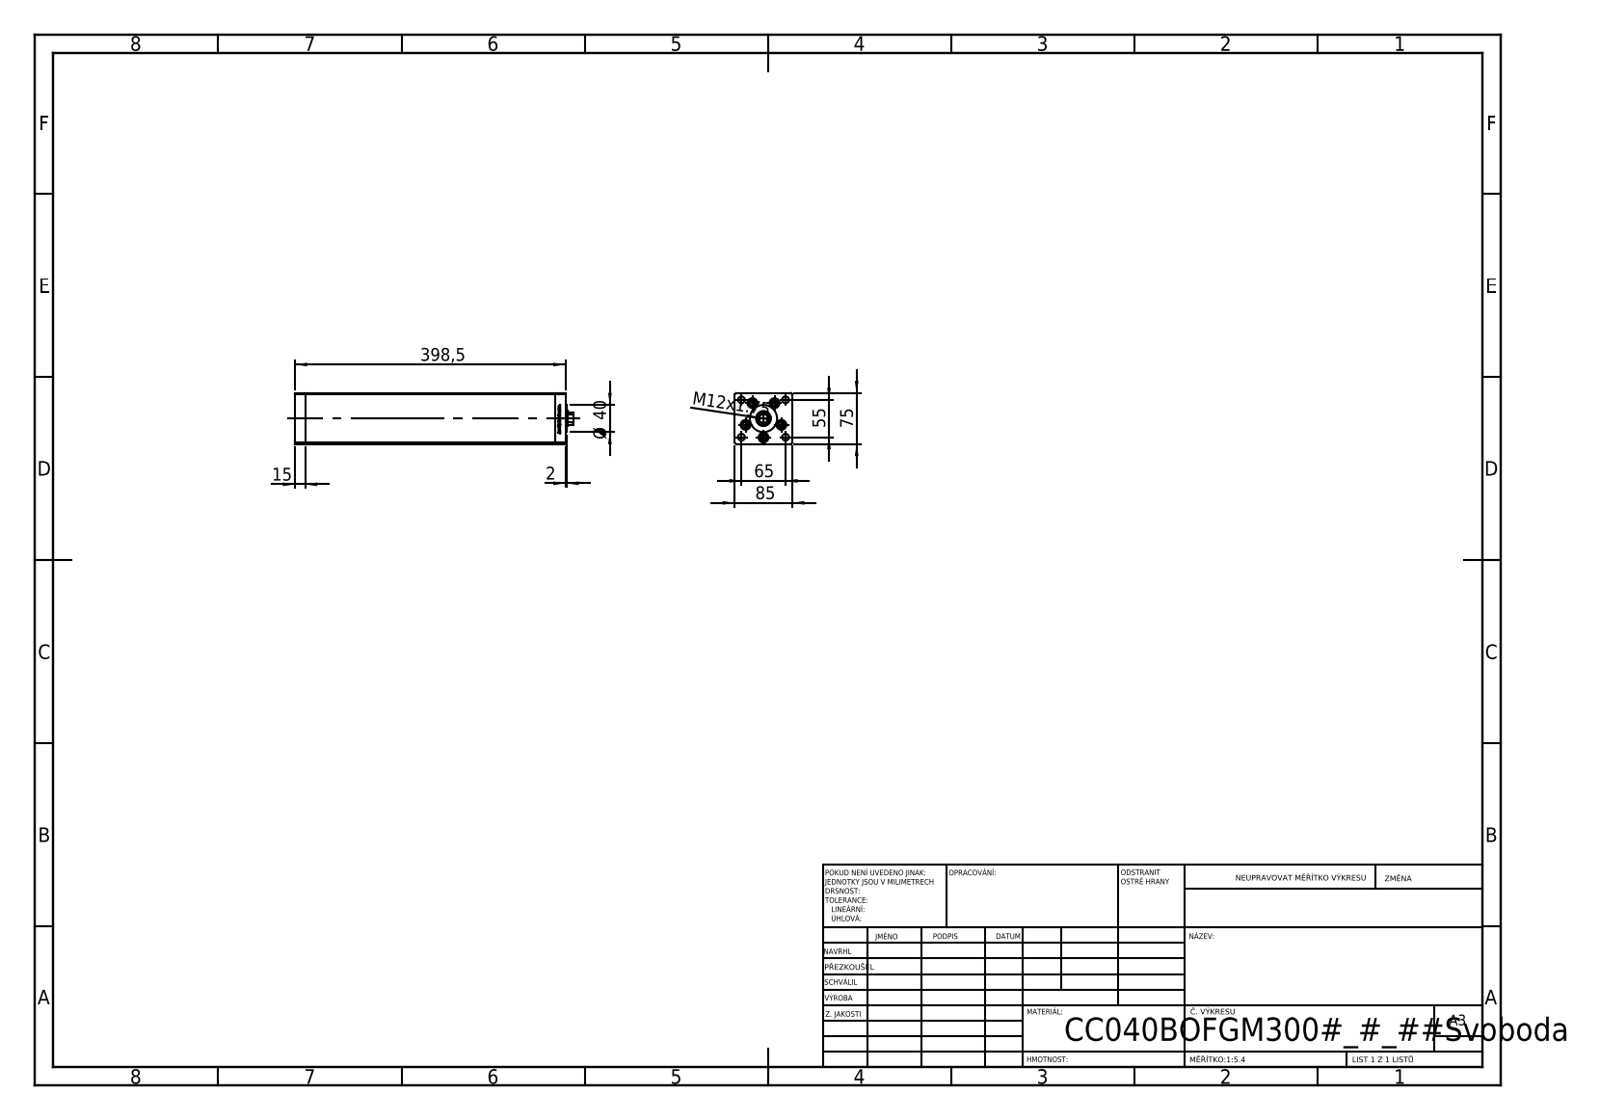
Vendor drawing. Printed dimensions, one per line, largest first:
398,5
85
75
65
55
Ø 40
15
M12x1.75
2
